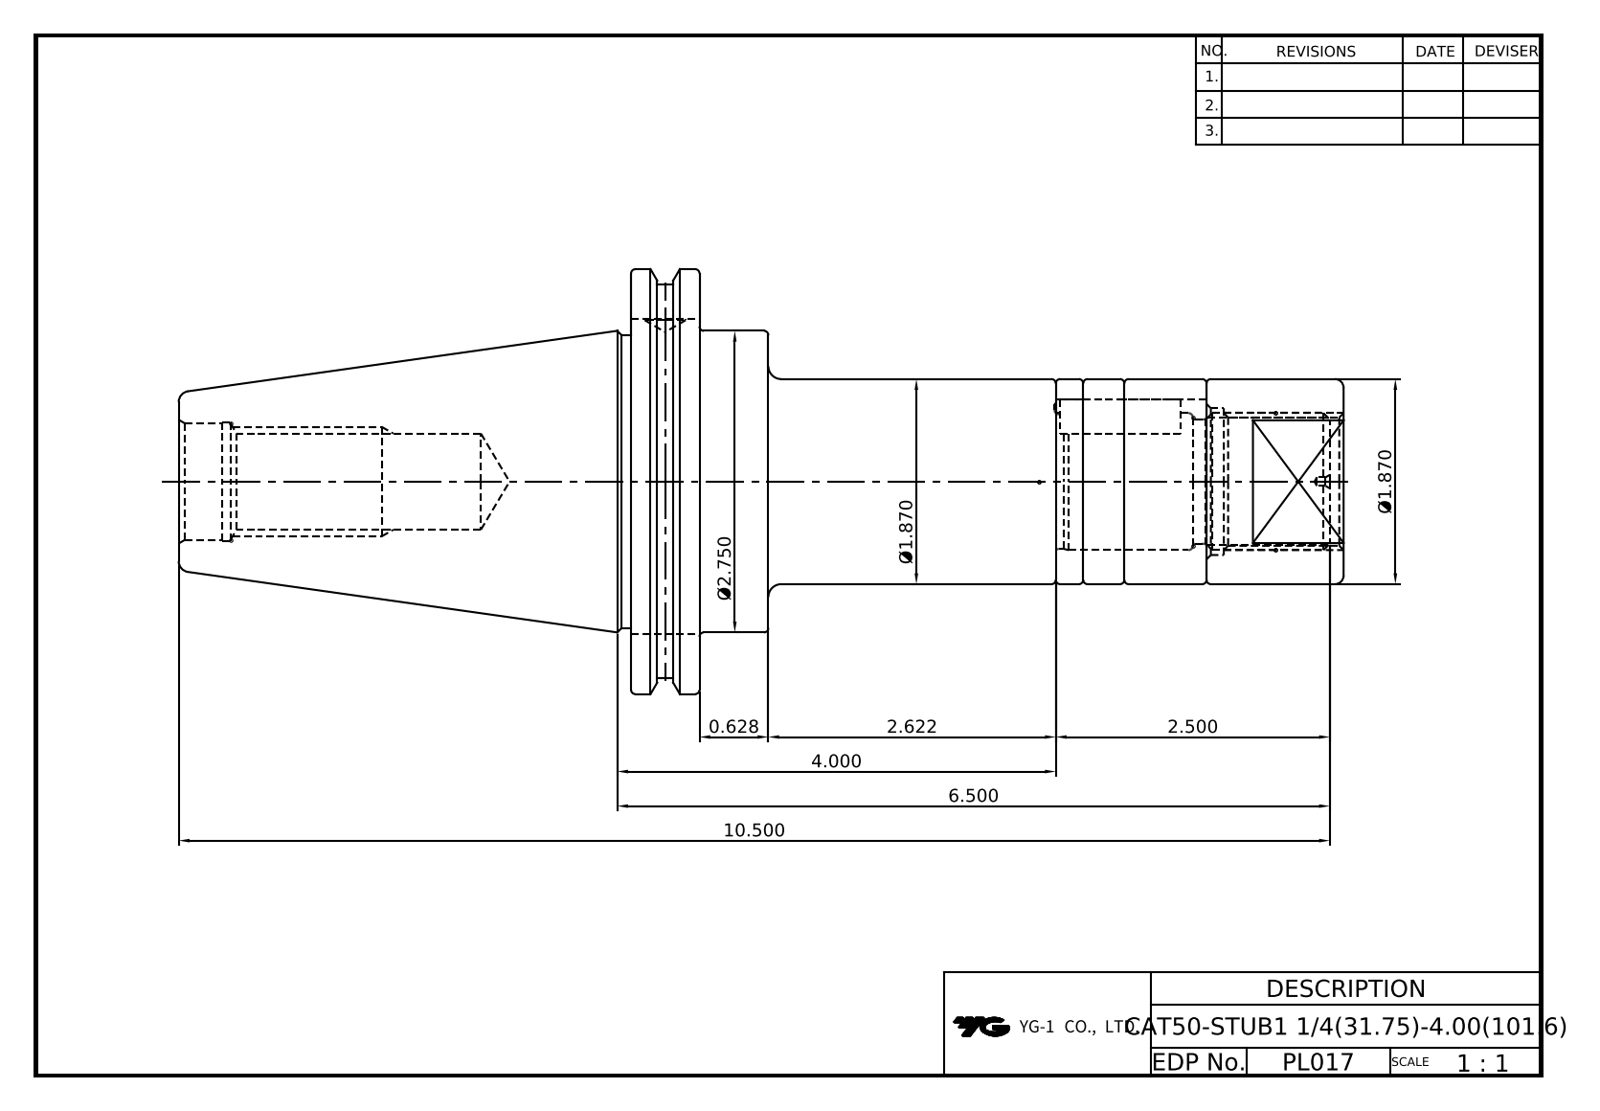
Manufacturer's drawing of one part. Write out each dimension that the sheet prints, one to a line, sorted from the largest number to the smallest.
10.500
6.500
4.000
Ø2.750
2.622
2.500
Ø1.870
Ø1.870
0.628
